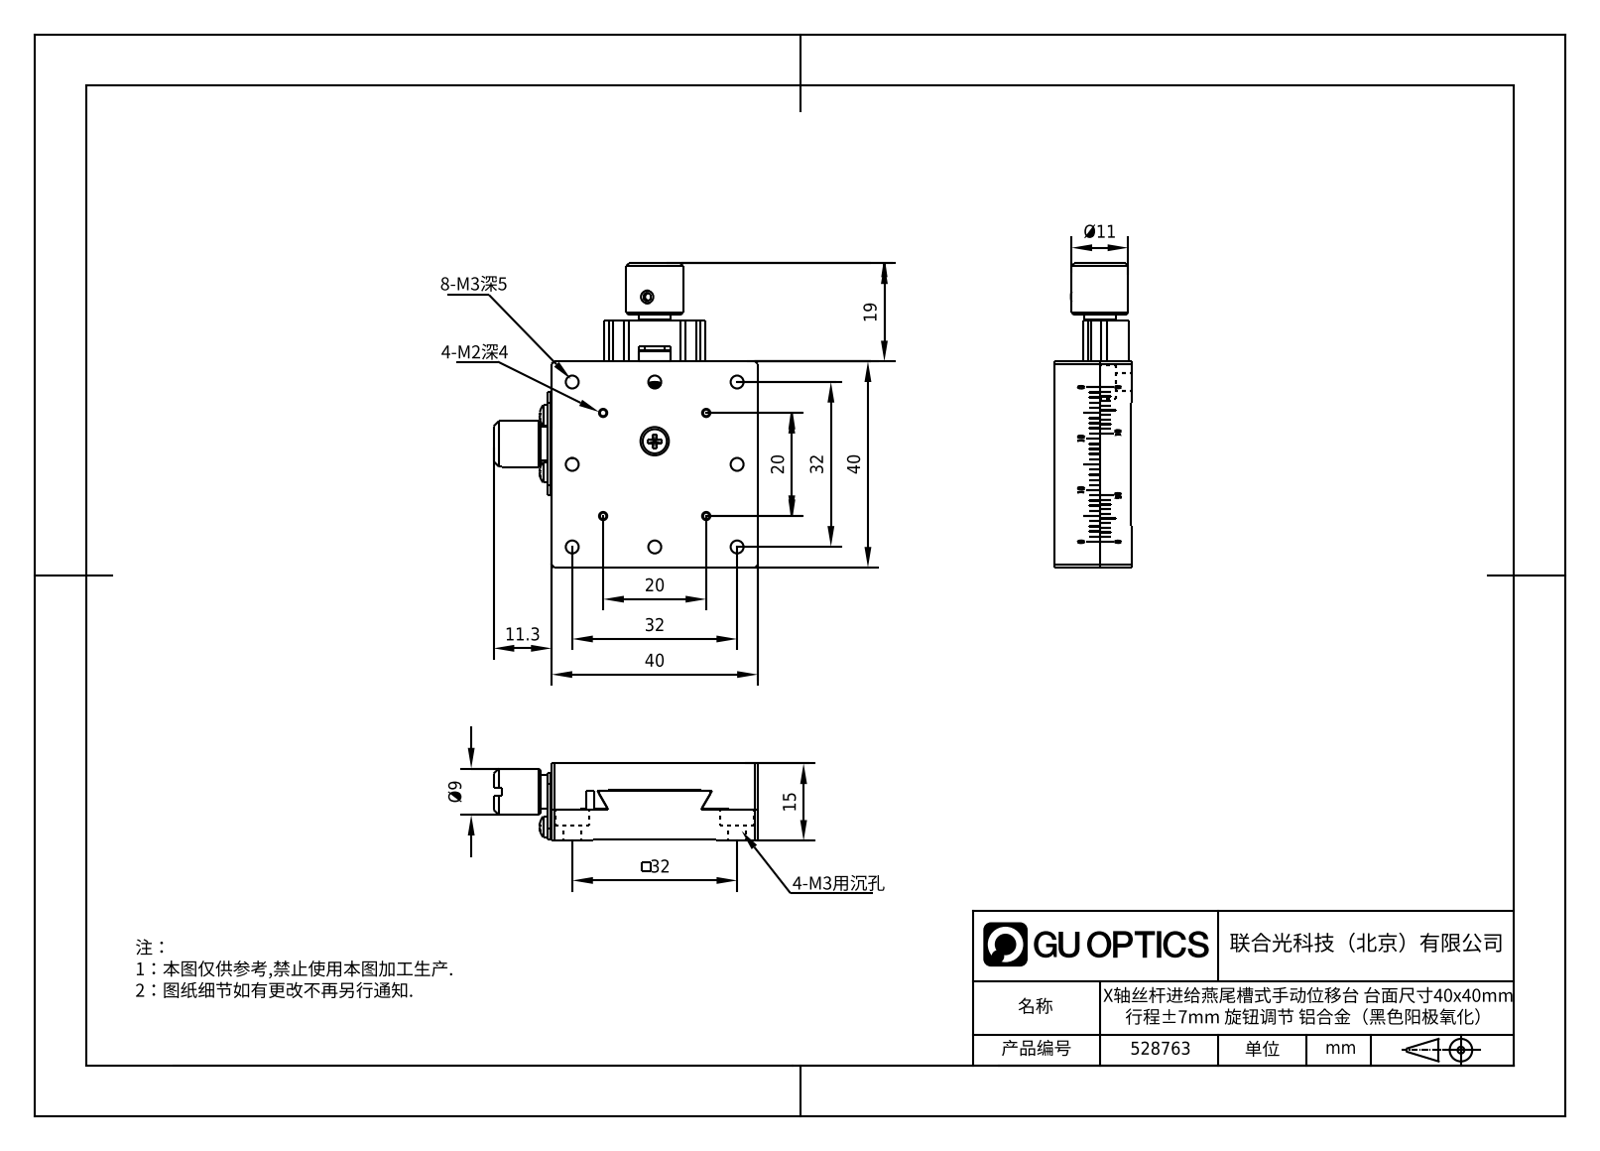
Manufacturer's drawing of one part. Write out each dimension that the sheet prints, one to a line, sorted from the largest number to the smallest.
40
40
32
32
32
20
20
19
15
11.3
Ø11
Ø9
